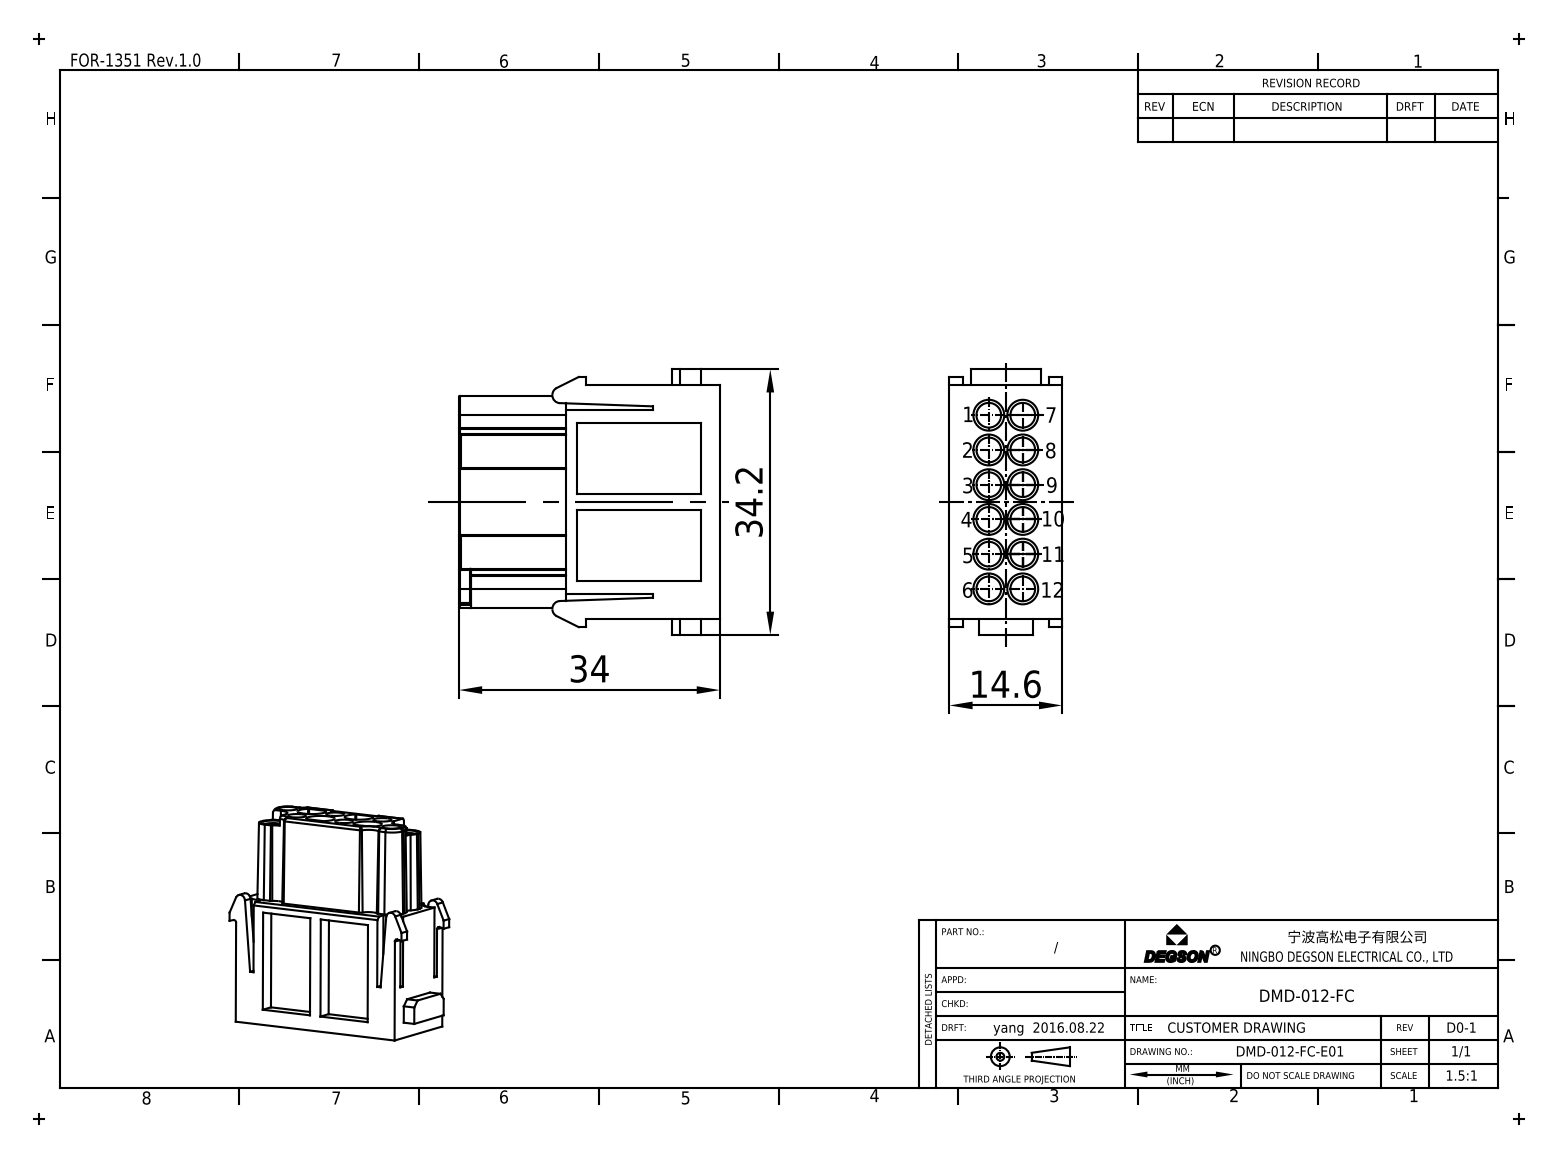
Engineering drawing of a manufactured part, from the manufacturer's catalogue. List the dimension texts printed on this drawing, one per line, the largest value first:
34.2
34
14.6
